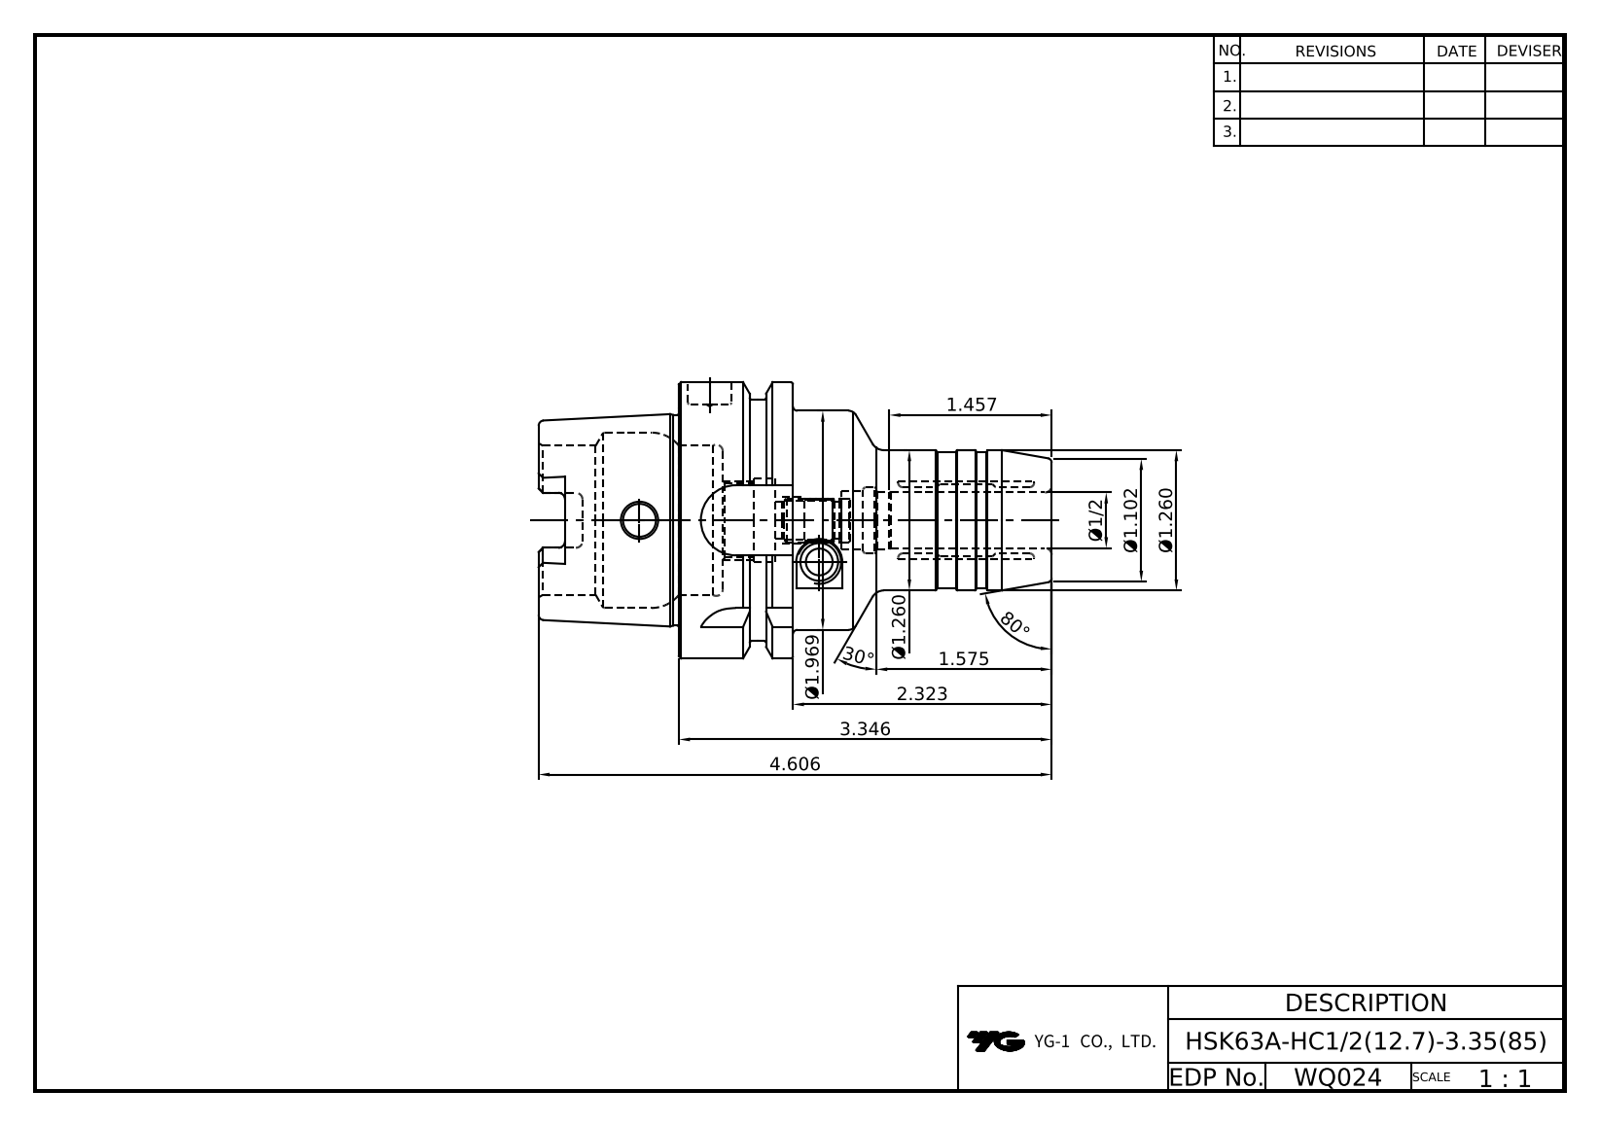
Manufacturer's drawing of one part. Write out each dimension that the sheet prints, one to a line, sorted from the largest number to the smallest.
80°
30°
4.606
3.346
2.323
Ø1.969
1.575
1.457
Ø1.260
Ø1.260
Ø1.102
Ø1/2
